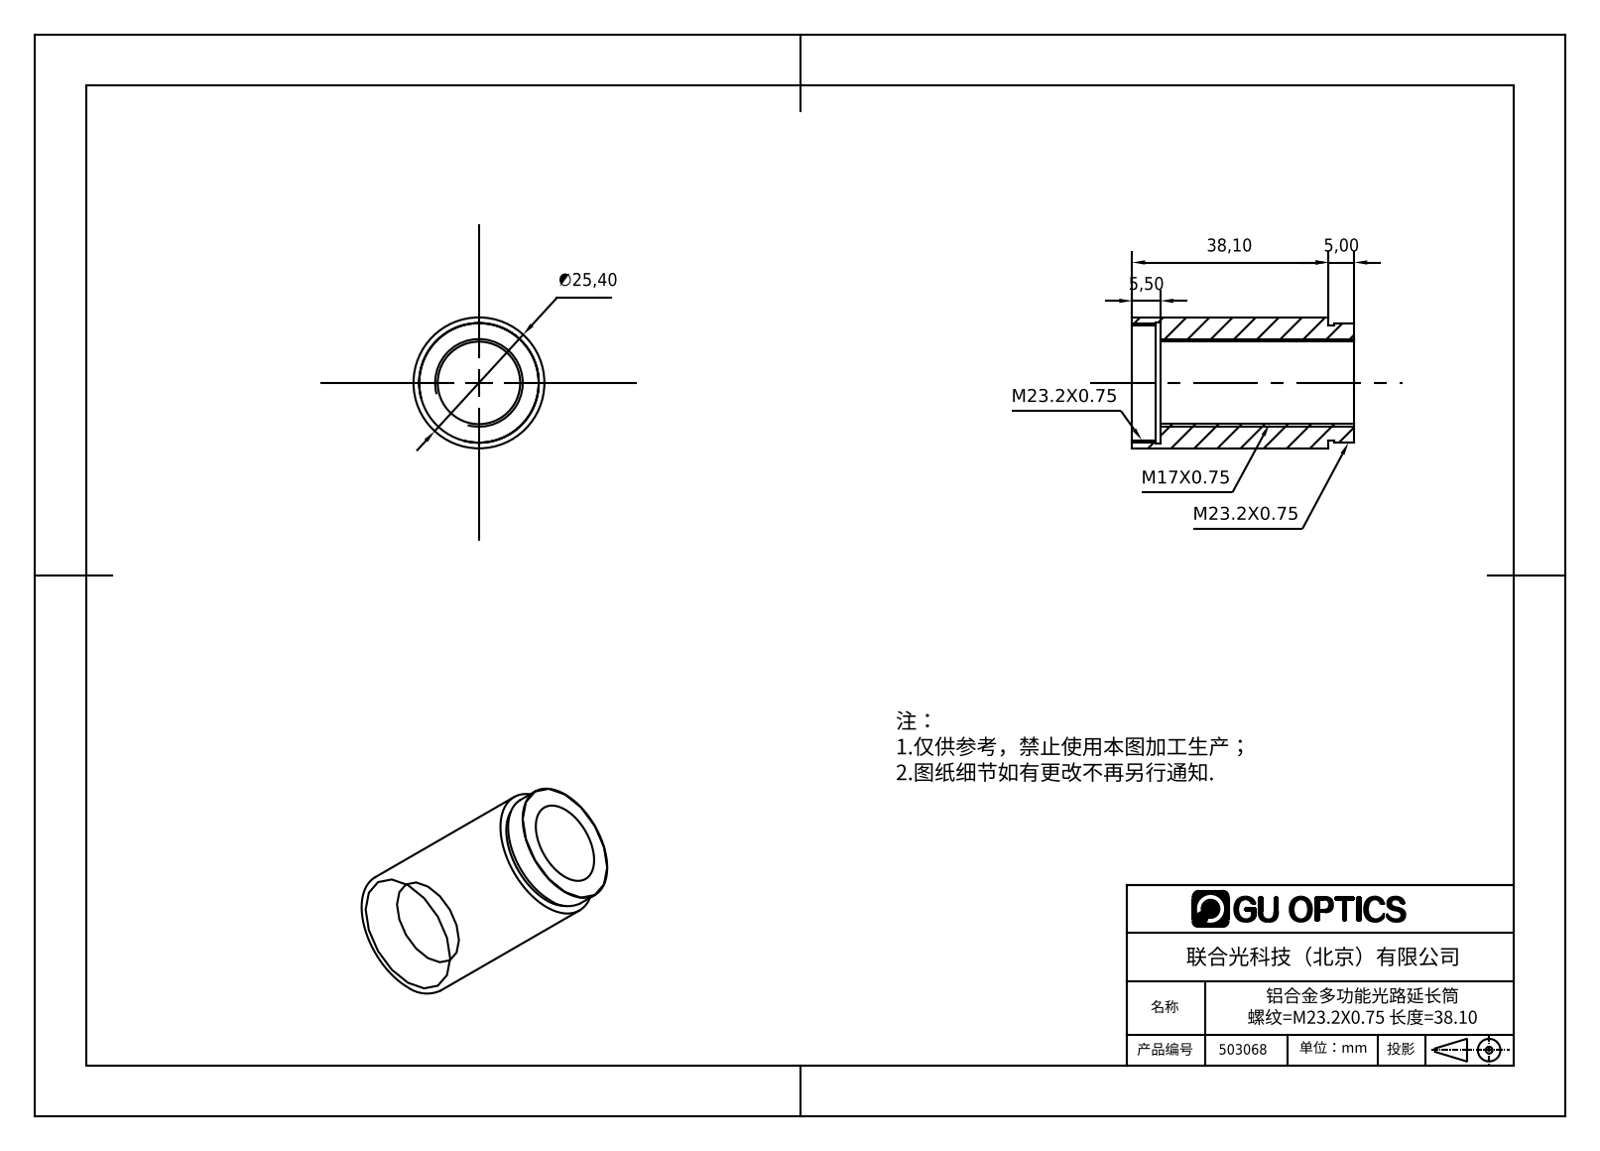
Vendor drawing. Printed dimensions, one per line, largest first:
38,10
∅25,40
5,50
5,00
